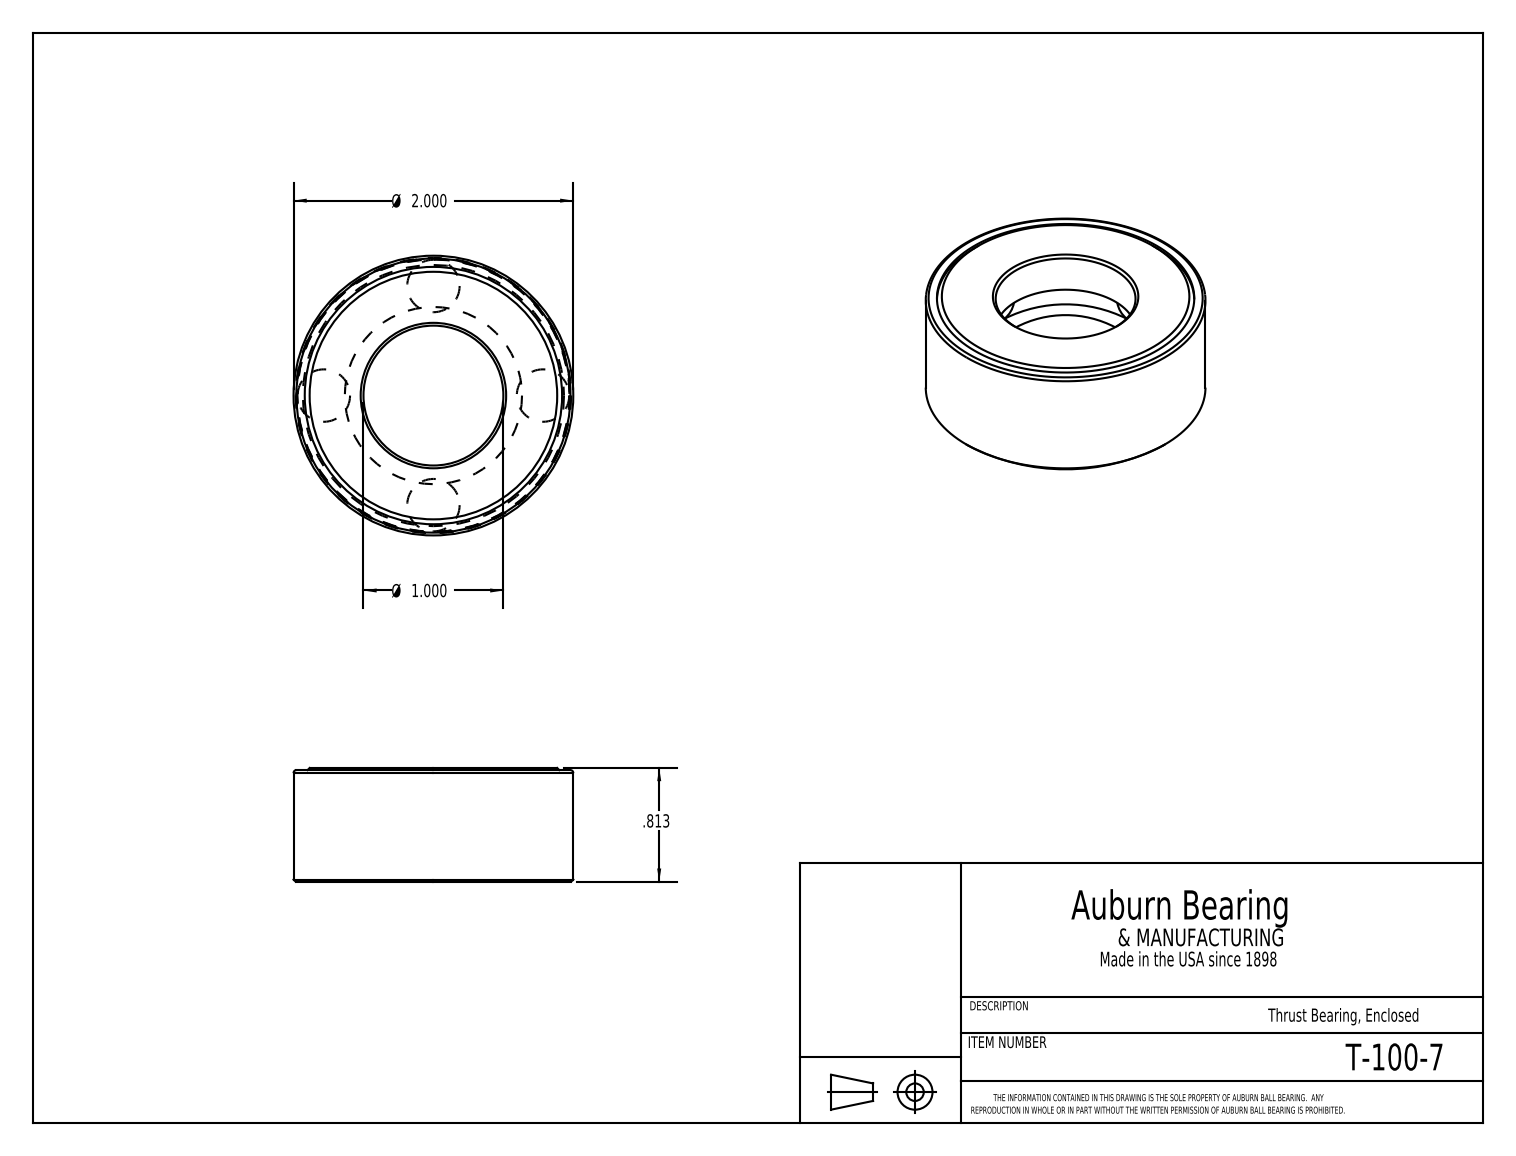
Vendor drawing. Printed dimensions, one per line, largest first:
Ø 2.000
Ø 1.000
.813
